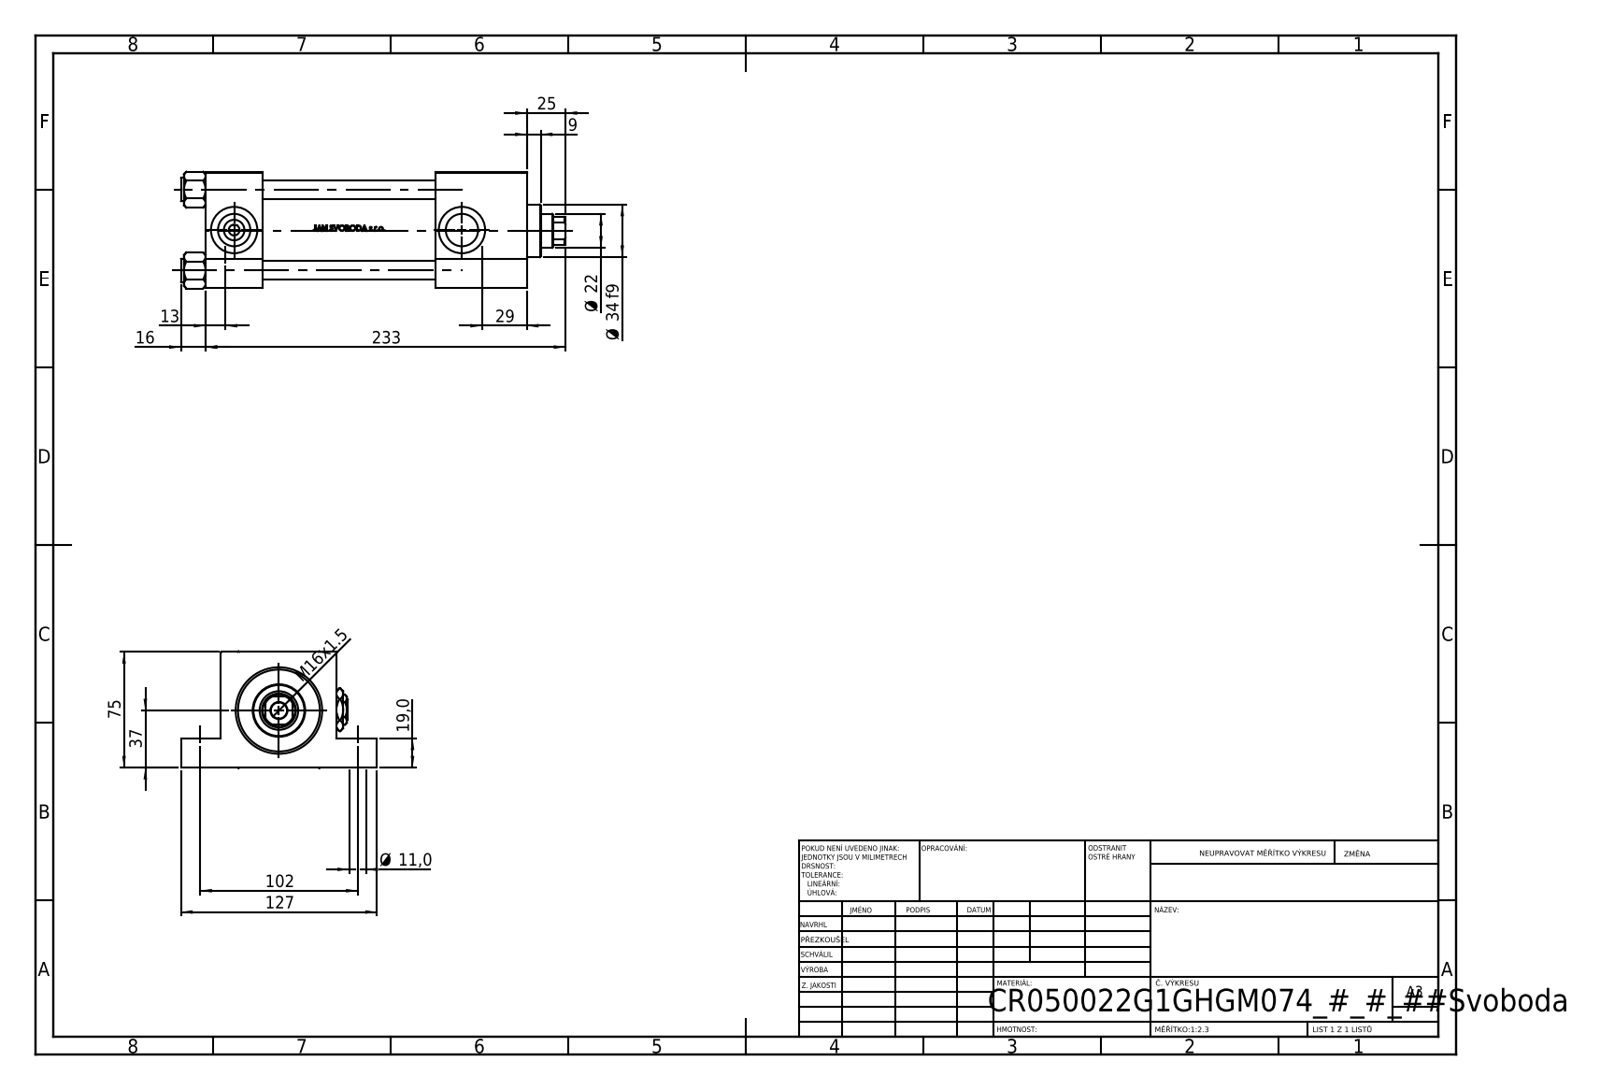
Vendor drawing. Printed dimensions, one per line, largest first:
233
127
102
75
37
Ø 34 f9
29
25
Ø 22
19,0
16
M16x1.5
13
Ø 11,0
9
